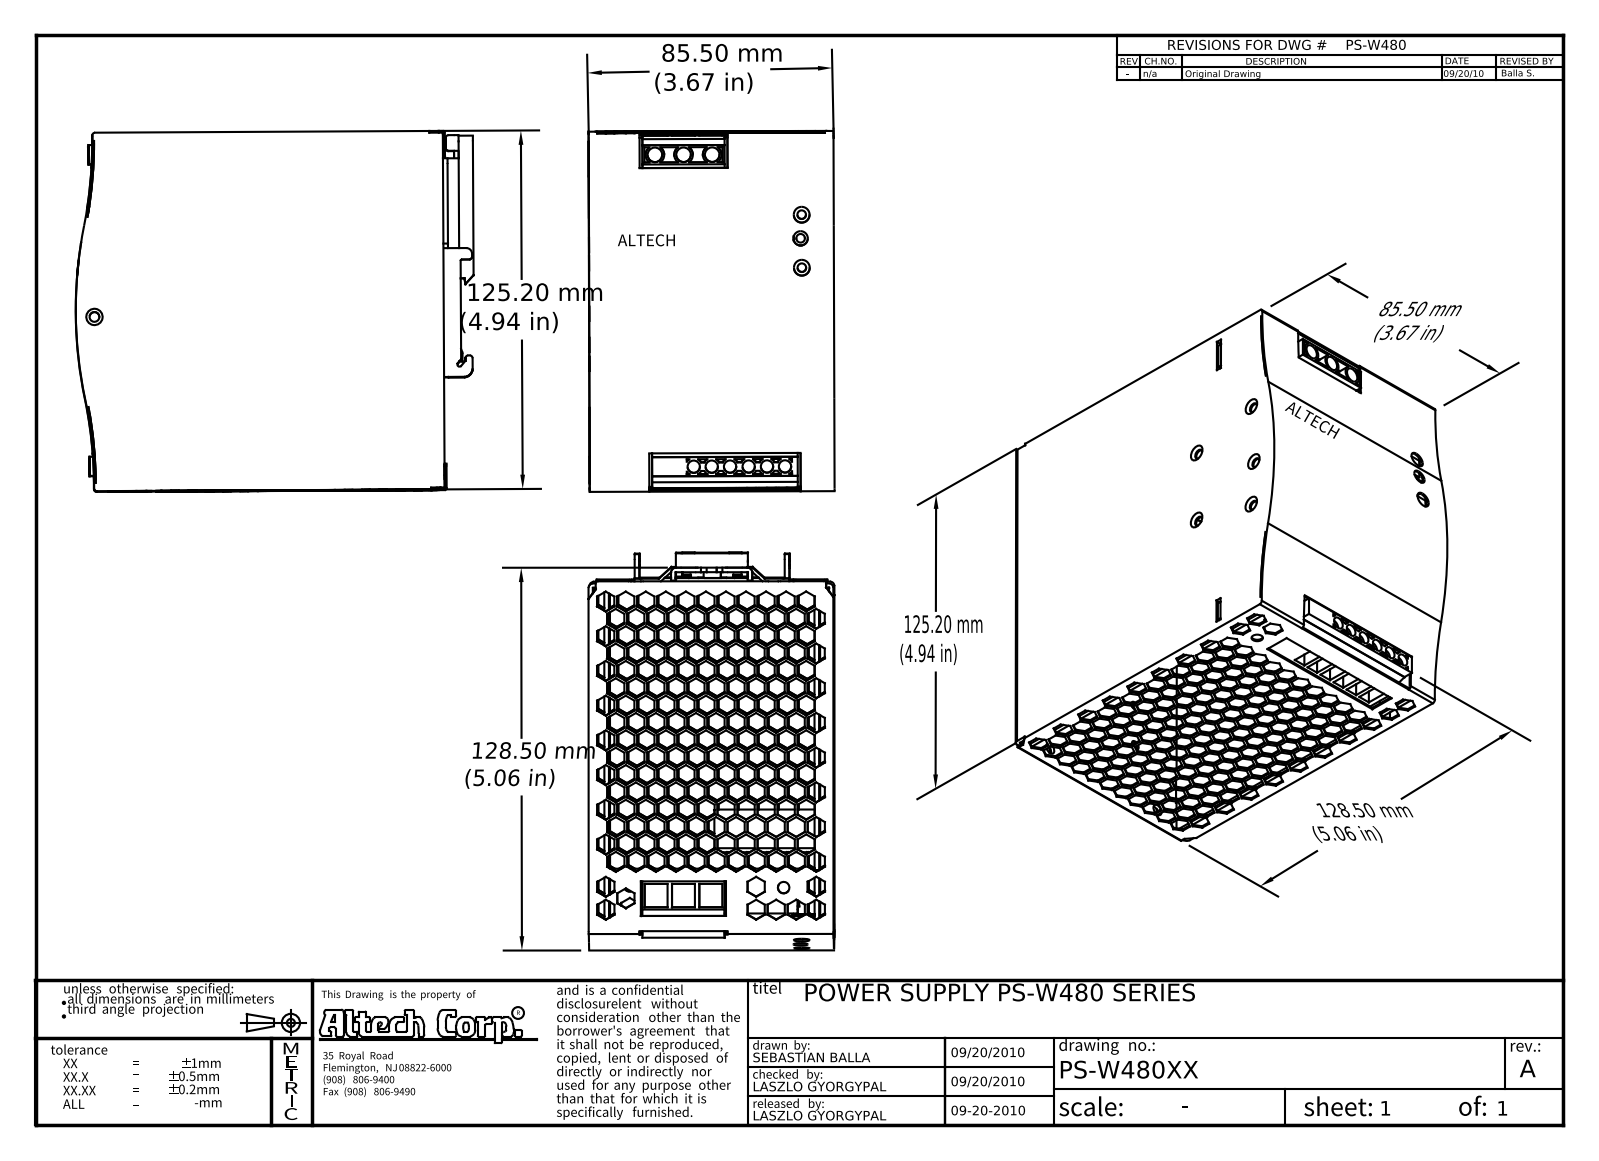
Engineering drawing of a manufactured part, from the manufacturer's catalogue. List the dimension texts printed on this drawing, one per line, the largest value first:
128.50 mm (5.06 in)
128.50 mm (5.06 in)
125.20 mm (4.94 in)
125.20 mm (4.94 in)
85.50 mm (3.67 in)
85.50 mm (3.67 in)
